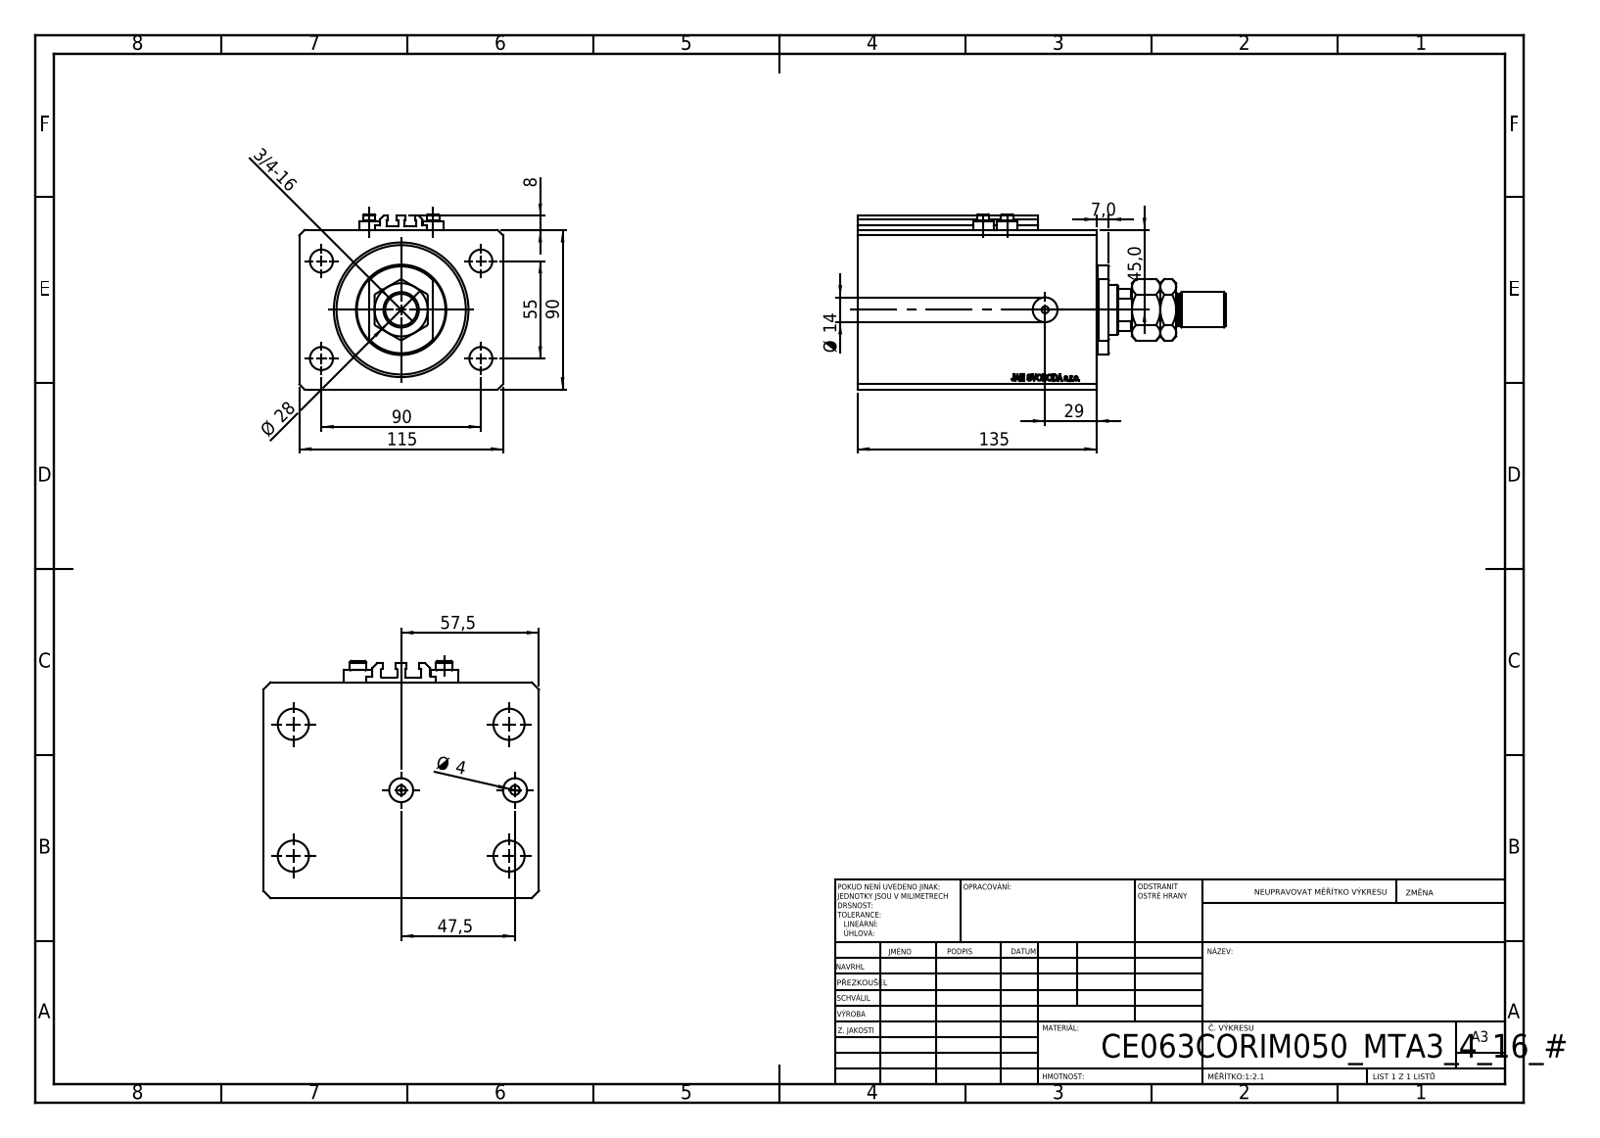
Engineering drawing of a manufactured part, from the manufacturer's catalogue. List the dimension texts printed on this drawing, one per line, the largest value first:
135
115
90
90
57,5
55
47,5
45,0
29
Ø 28
Ø 14
8
7,0
Ø 4
3/4-16
